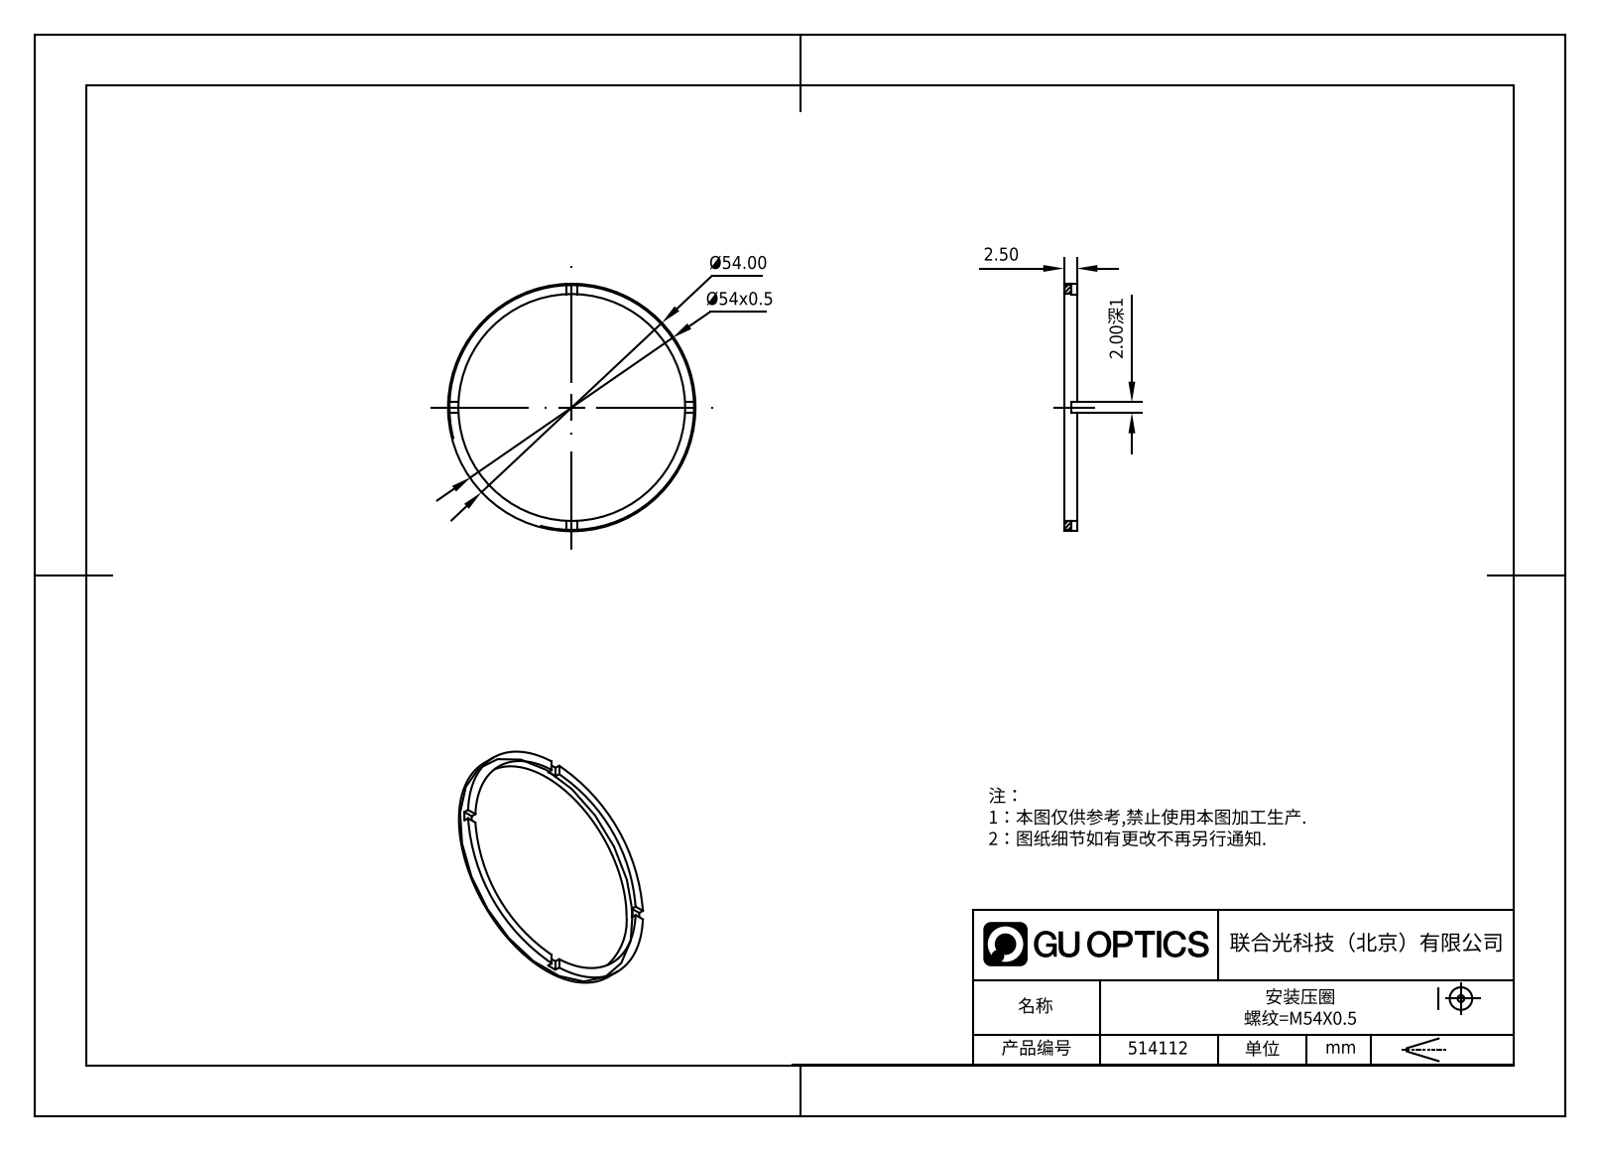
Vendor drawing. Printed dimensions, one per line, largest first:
Ø54.00
Ø54x0.5
2.50
2.00深1
